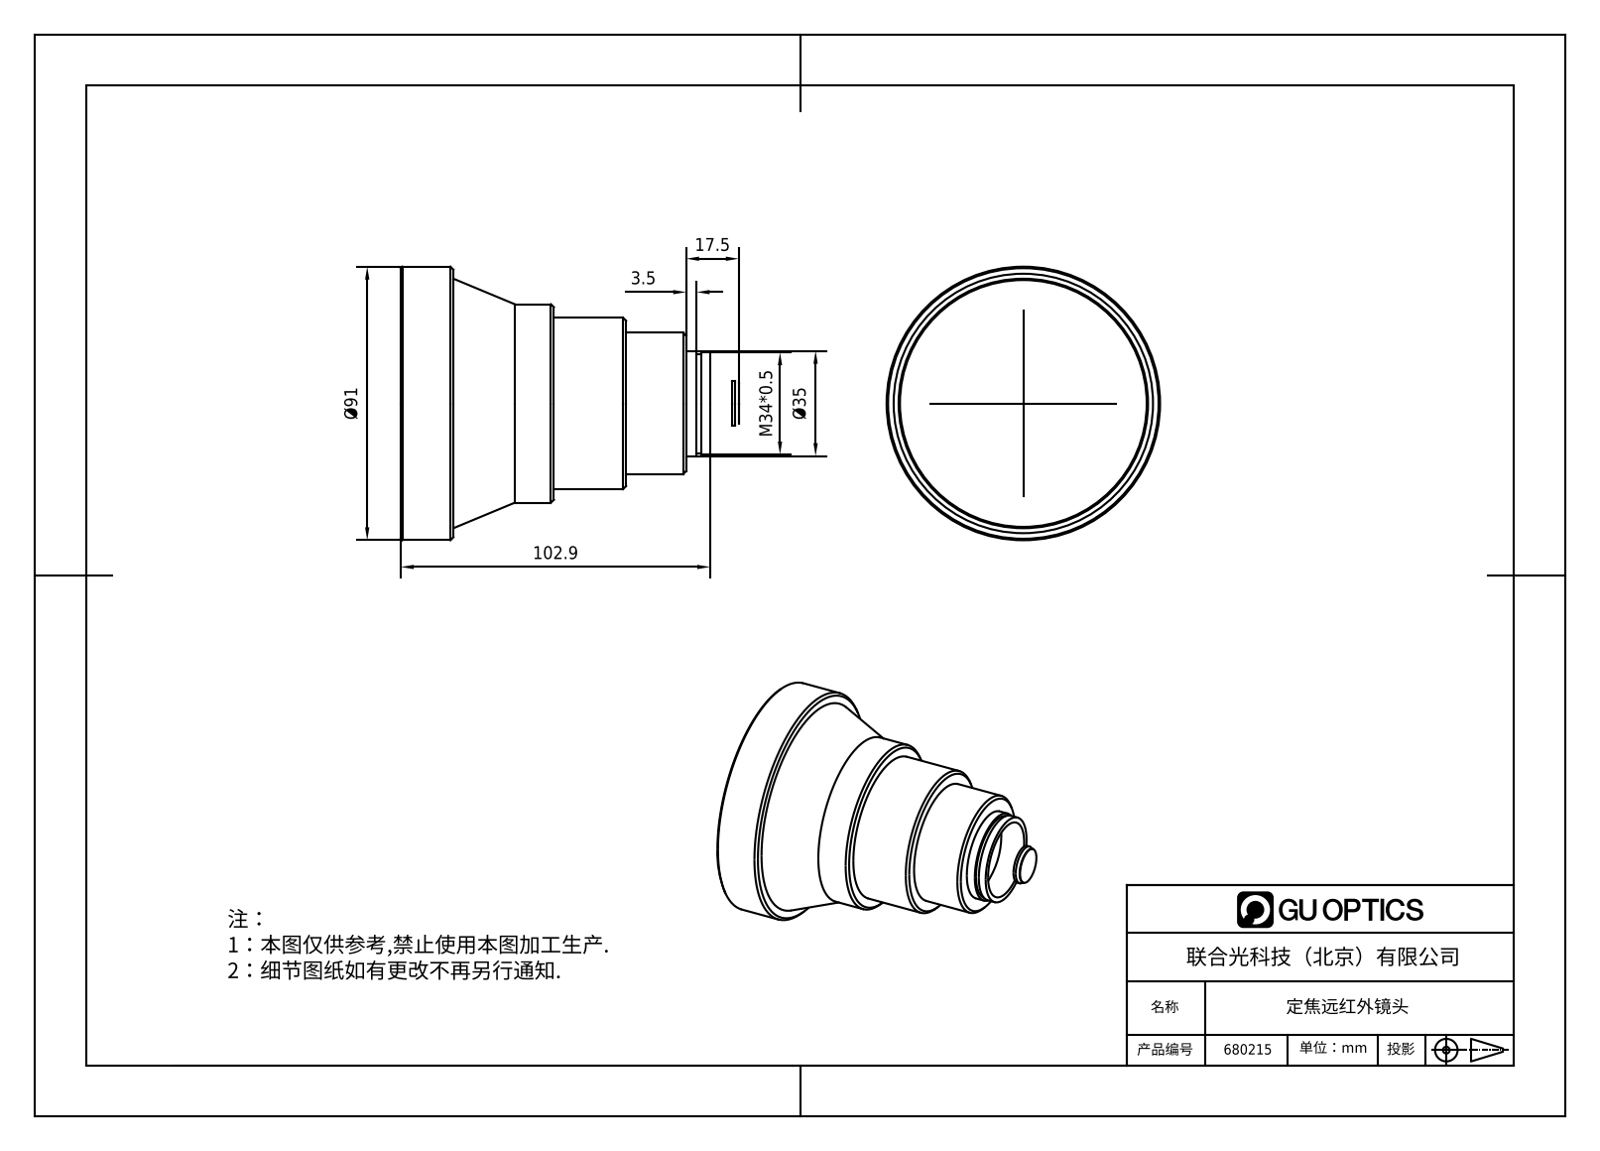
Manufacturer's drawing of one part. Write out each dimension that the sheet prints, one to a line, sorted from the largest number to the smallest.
102.9
Ø91
Ø35
M34*0.5
17.5
3.5
